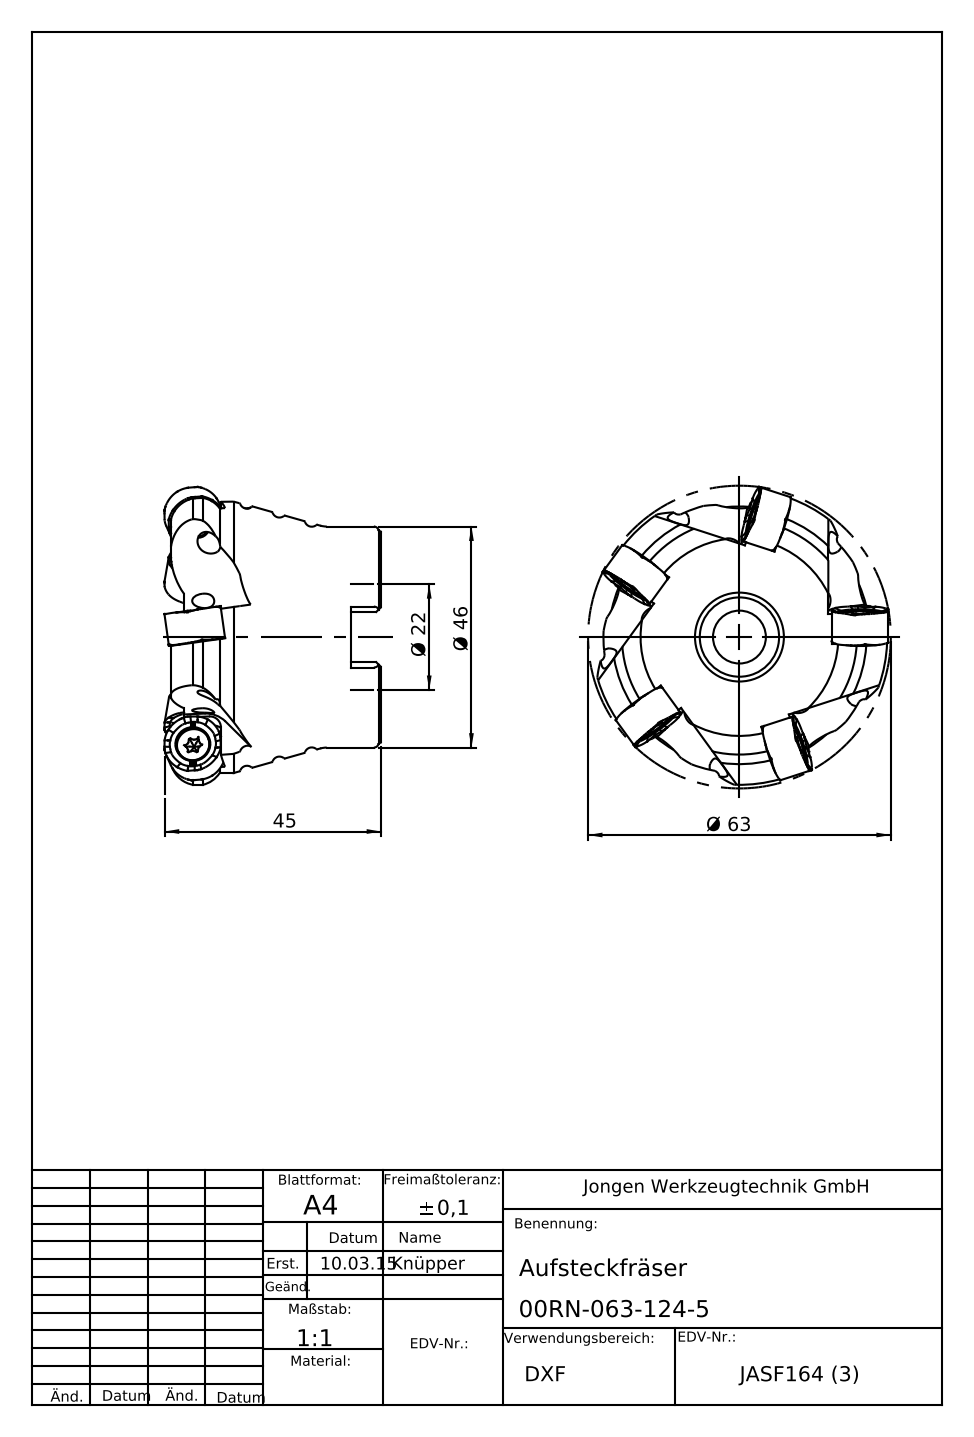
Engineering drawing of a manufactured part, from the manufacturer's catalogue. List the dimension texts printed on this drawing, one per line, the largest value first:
Ø 63
Ø 46
45
Ø 22
